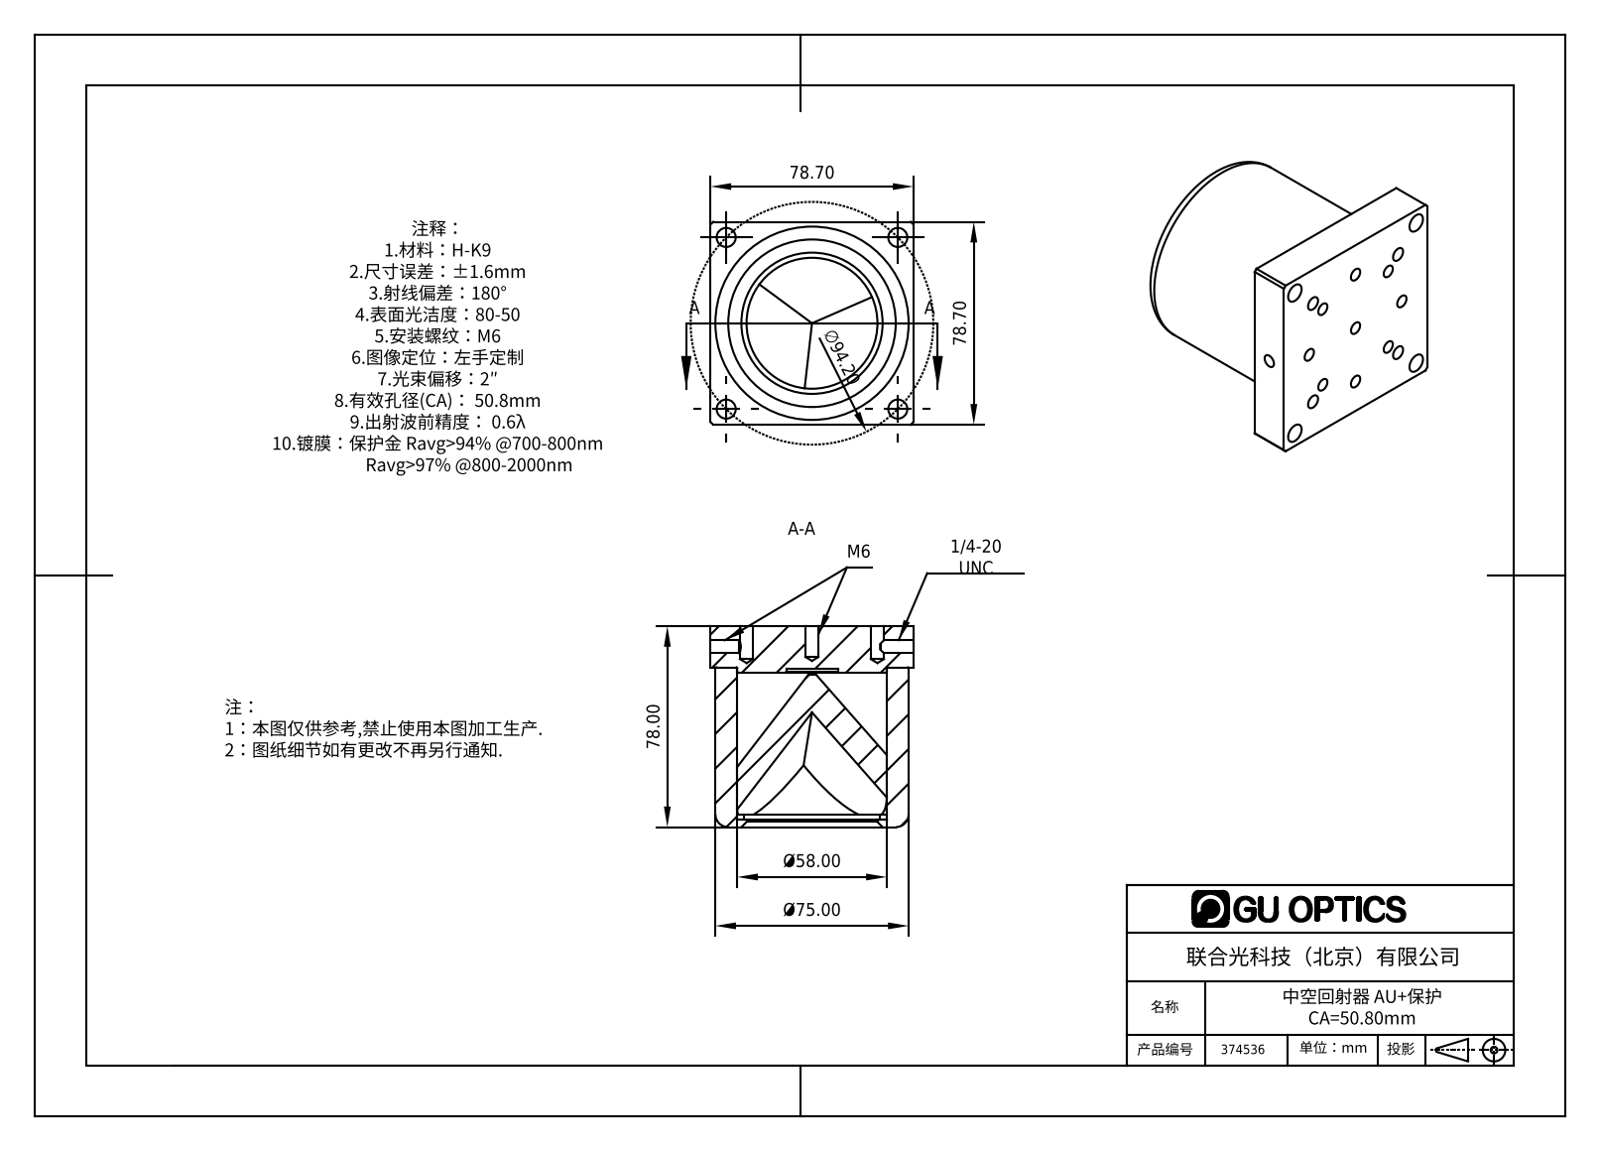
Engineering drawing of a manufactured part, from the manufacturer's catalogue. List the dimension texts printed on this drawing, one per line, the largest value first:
∅94.20
78.70
78.70
78.00
Ø75.00
Ø58.00
